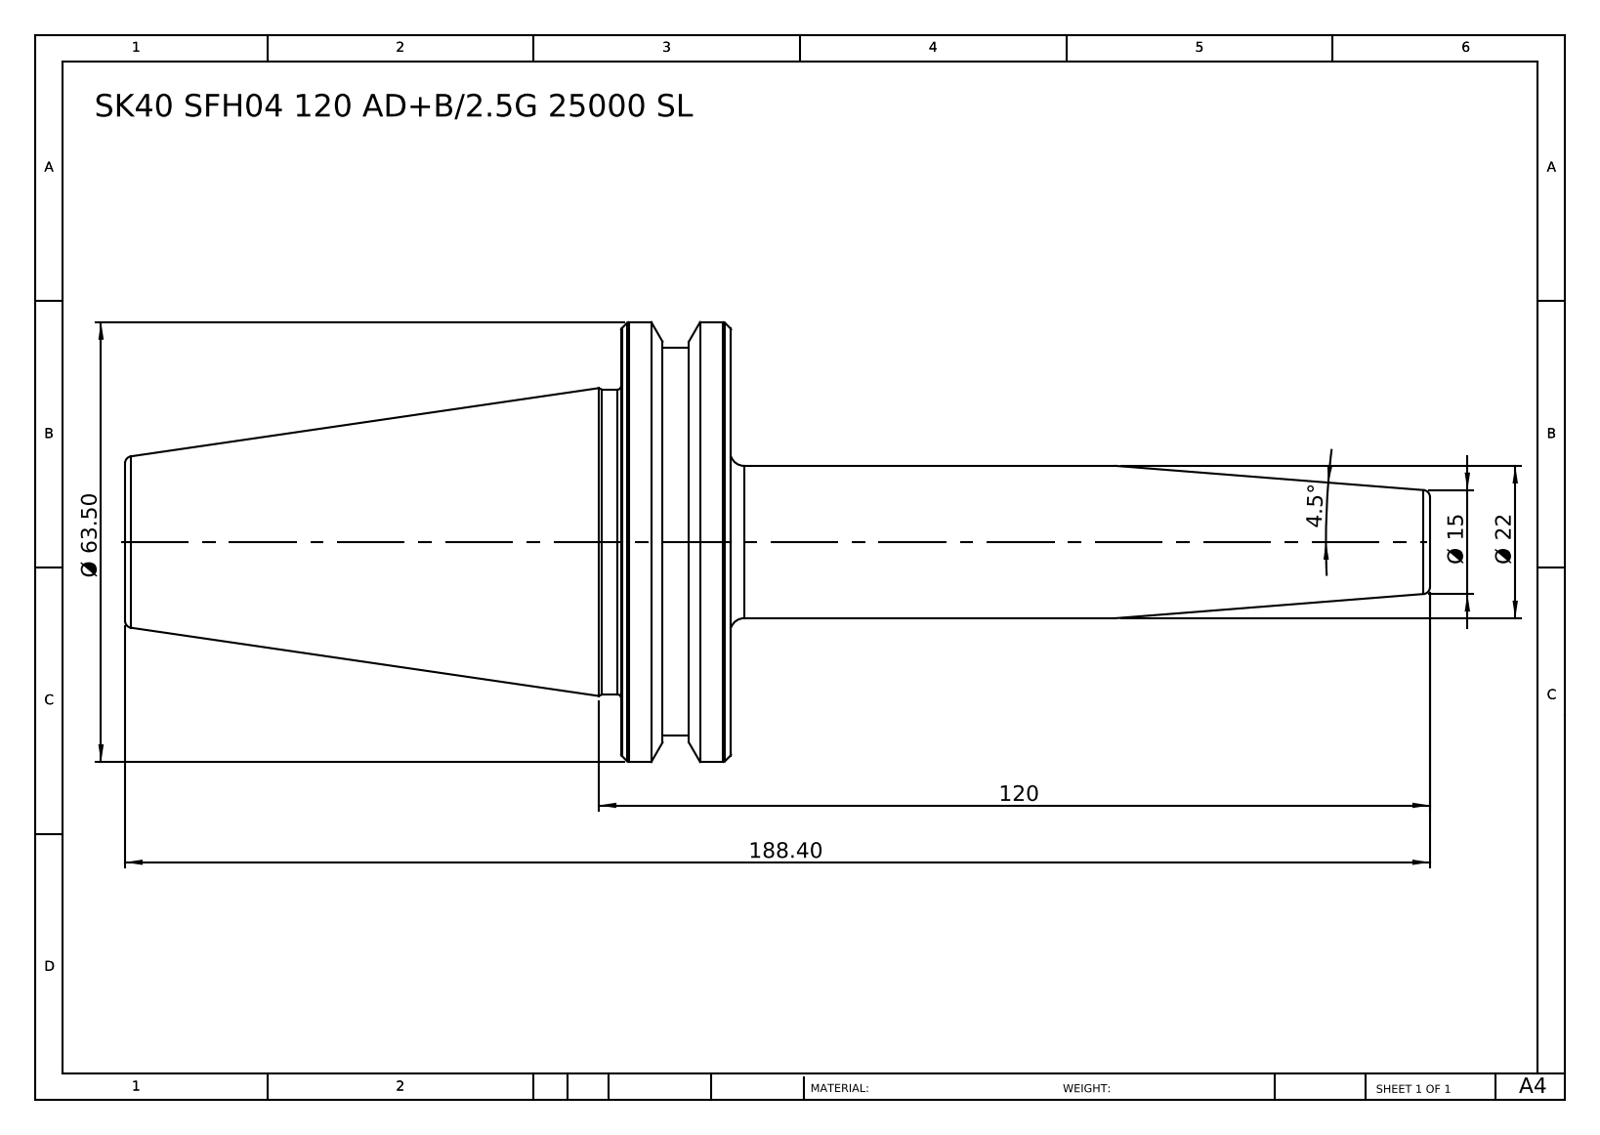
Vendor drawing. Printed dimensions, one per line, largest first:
188.40
120
Ø 63.50
Ø 22
Ø 15
4.5°
